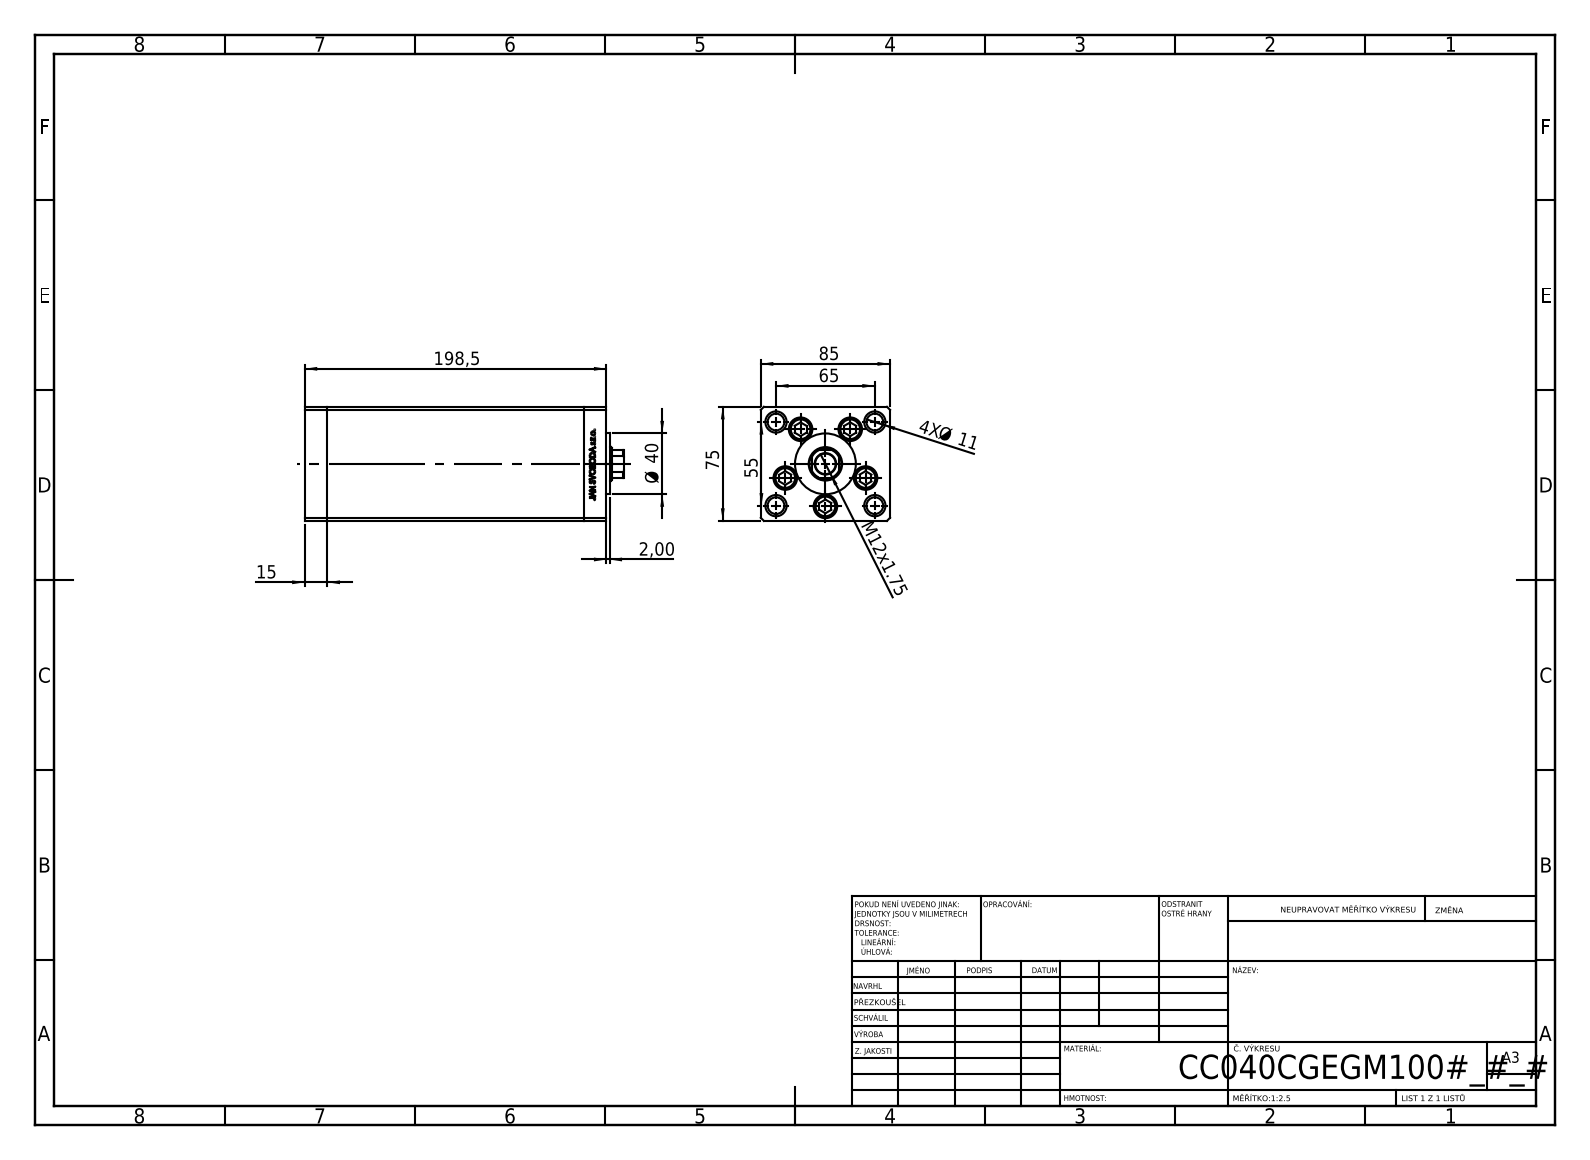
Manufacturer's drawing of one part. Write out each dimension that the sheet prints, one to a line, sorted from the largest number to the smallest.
198,5
85
75
65
55
Ø 40
15
M12x1.75
4X Ø 11
2,00
